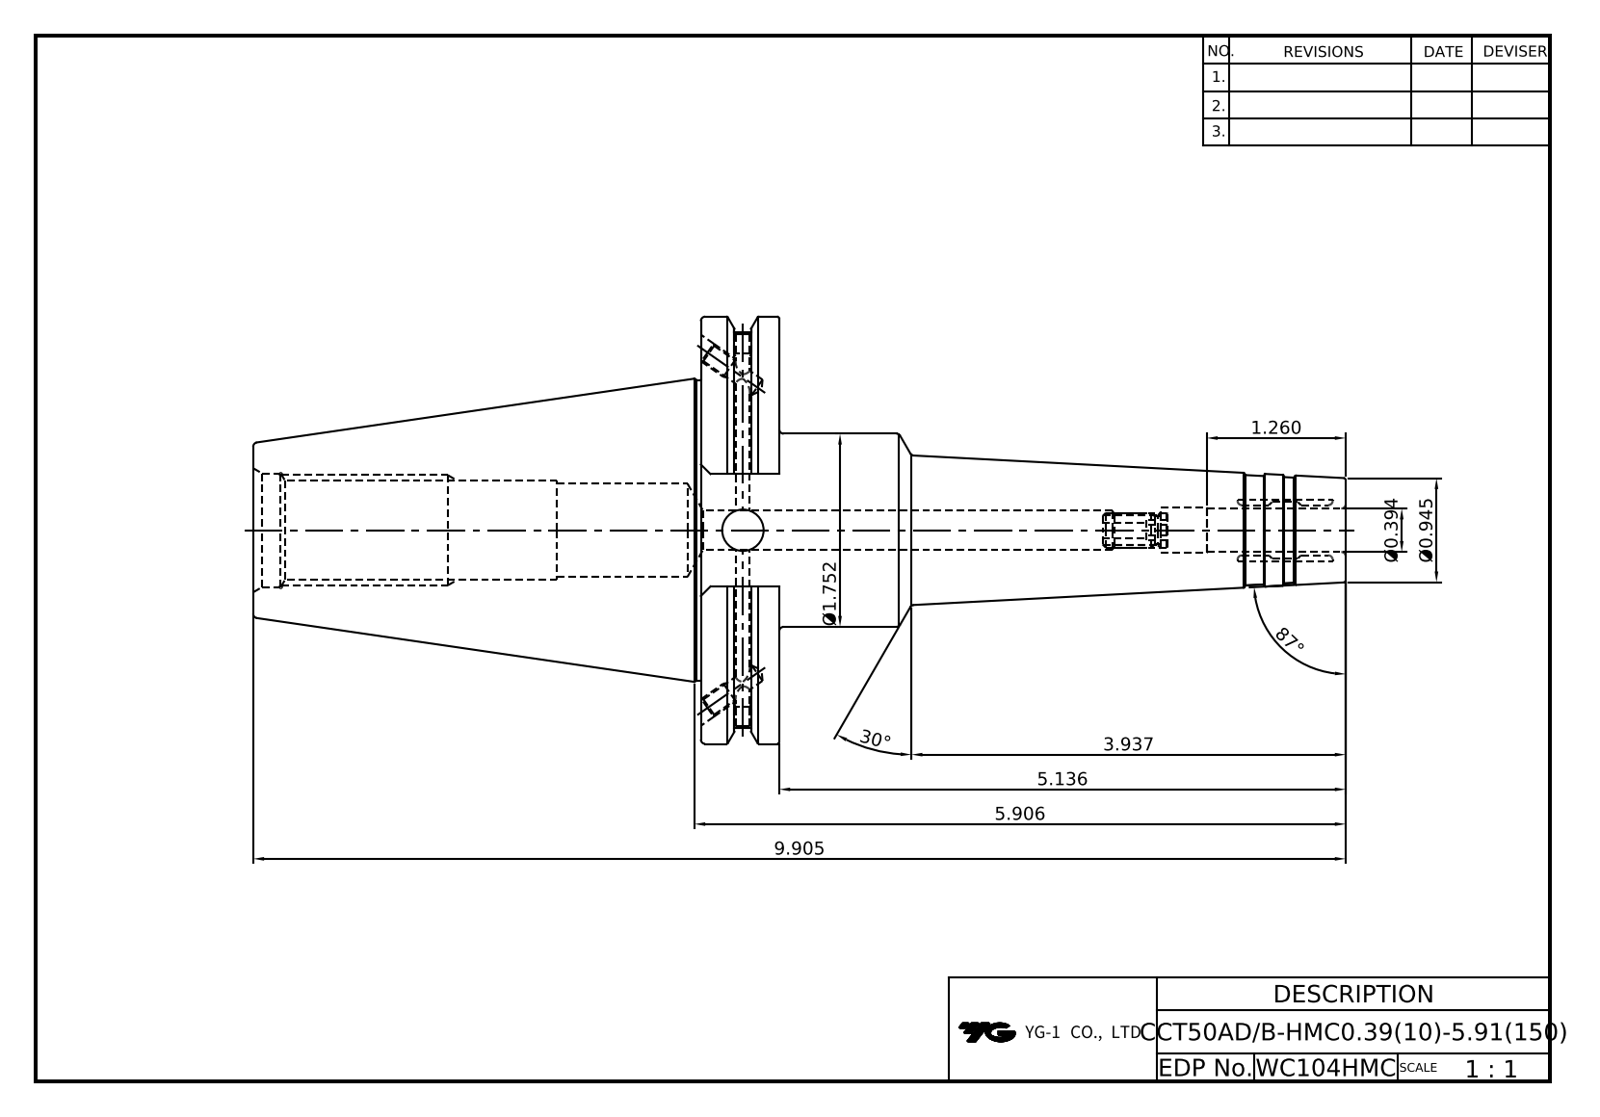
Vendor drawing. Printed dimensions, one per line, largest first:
87°
30°
9.905
5.906
5.136
3.937
Ø1.752
1.260
Ø0.945
Ø0.394
